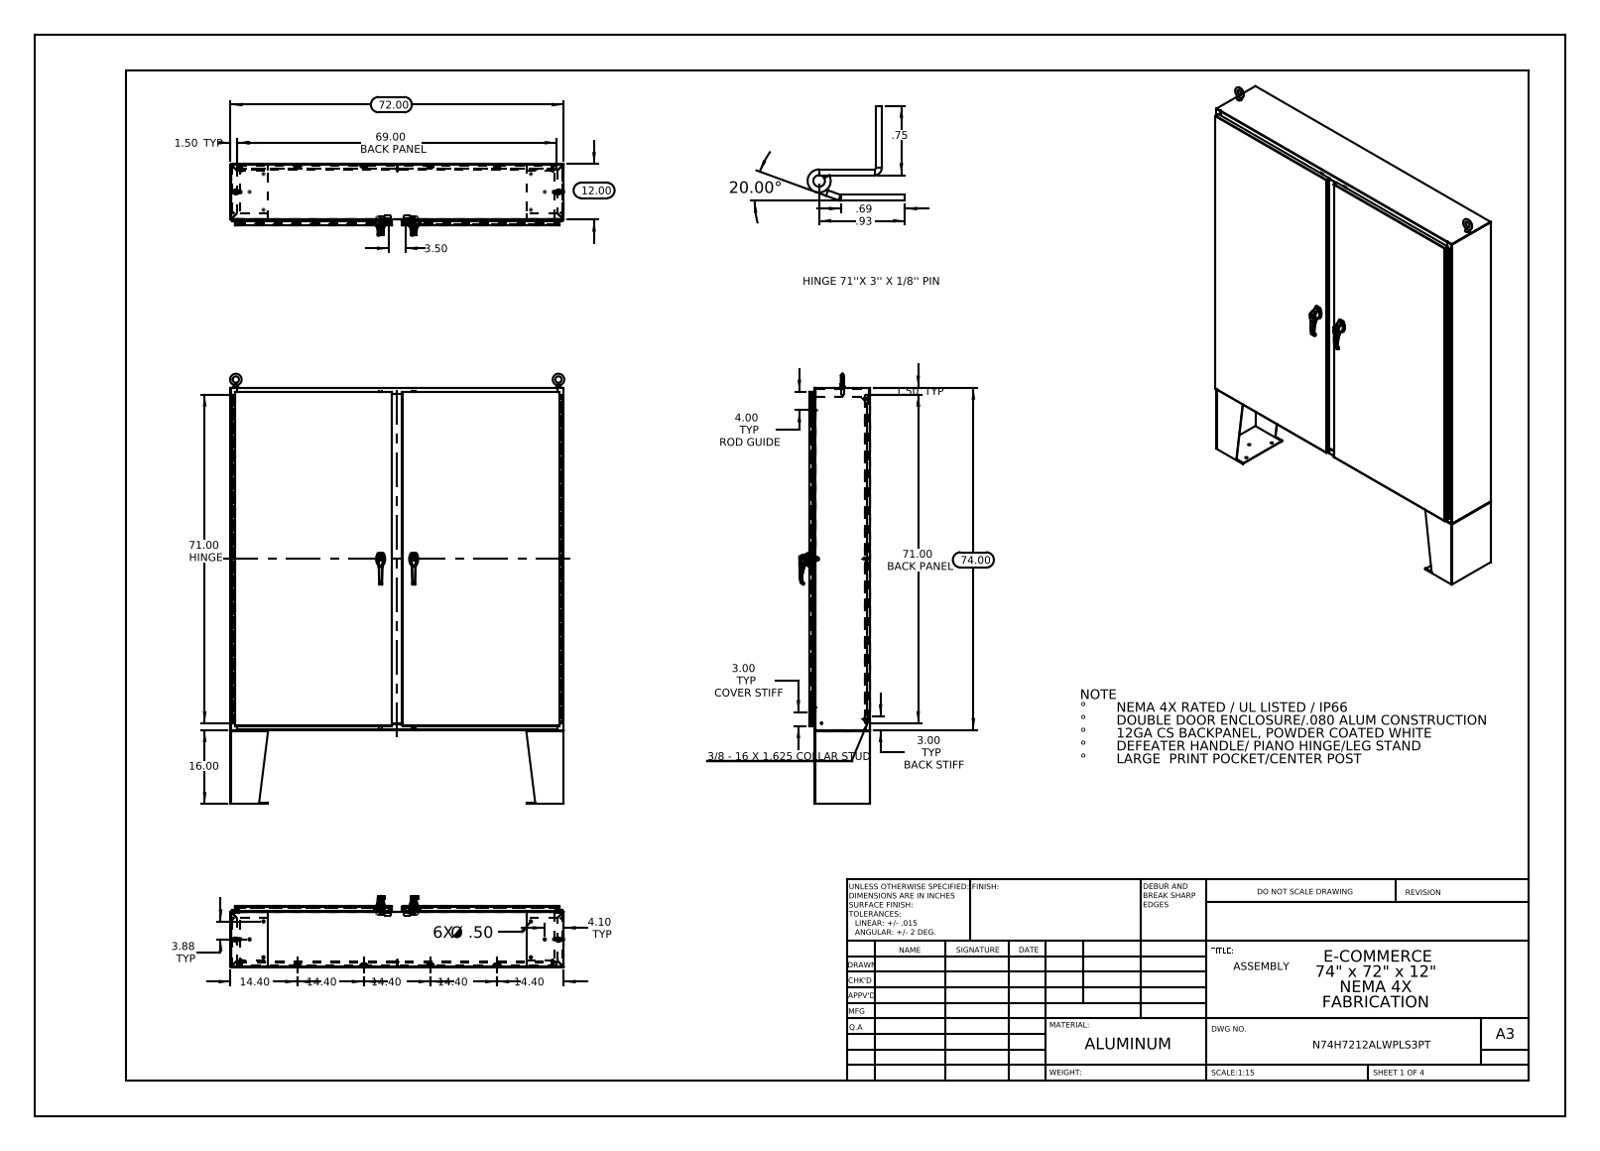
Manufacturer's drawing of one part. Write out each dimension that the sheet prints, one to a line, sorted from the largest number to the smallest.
74.00
72.00
71.00 HINGE
71.00 BACK PANEL
69.00 BACK PANEL
20.00°
16.00
14.40
14.40
14.40
14.40
14.40
12.00
4.10 TYP
4.00 TYP ROD GUIDE
3.88 TYP
3.50
3.00 TYP BACK STIFF
3.00 TYP COVER STIFF
1.50 TYP
1.50 TYP
.93
.75
.69
6X Ø .50
